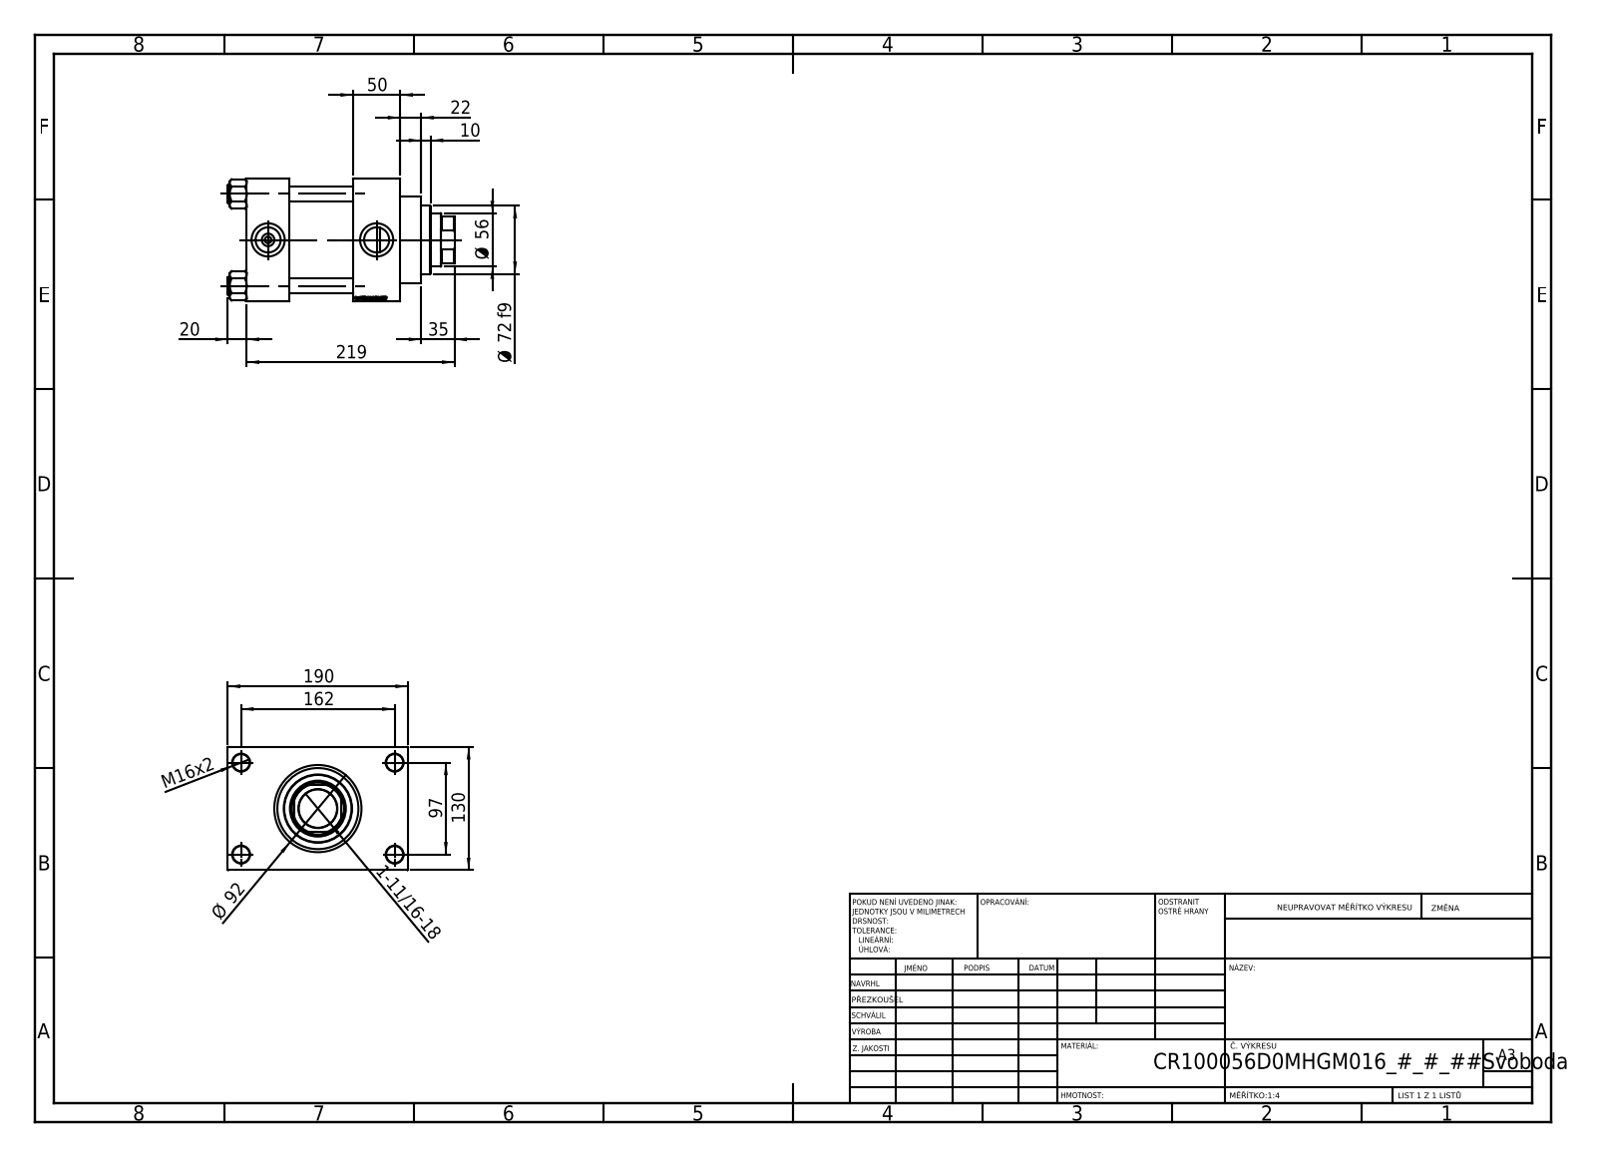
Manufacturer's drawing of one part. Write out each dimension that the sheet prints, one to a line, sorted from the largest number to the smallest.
219
190
162
130
97
Ø 92
Ø 72 f9
Ø 56
50
35
22
20
M16x2
10
1-11/16-18
